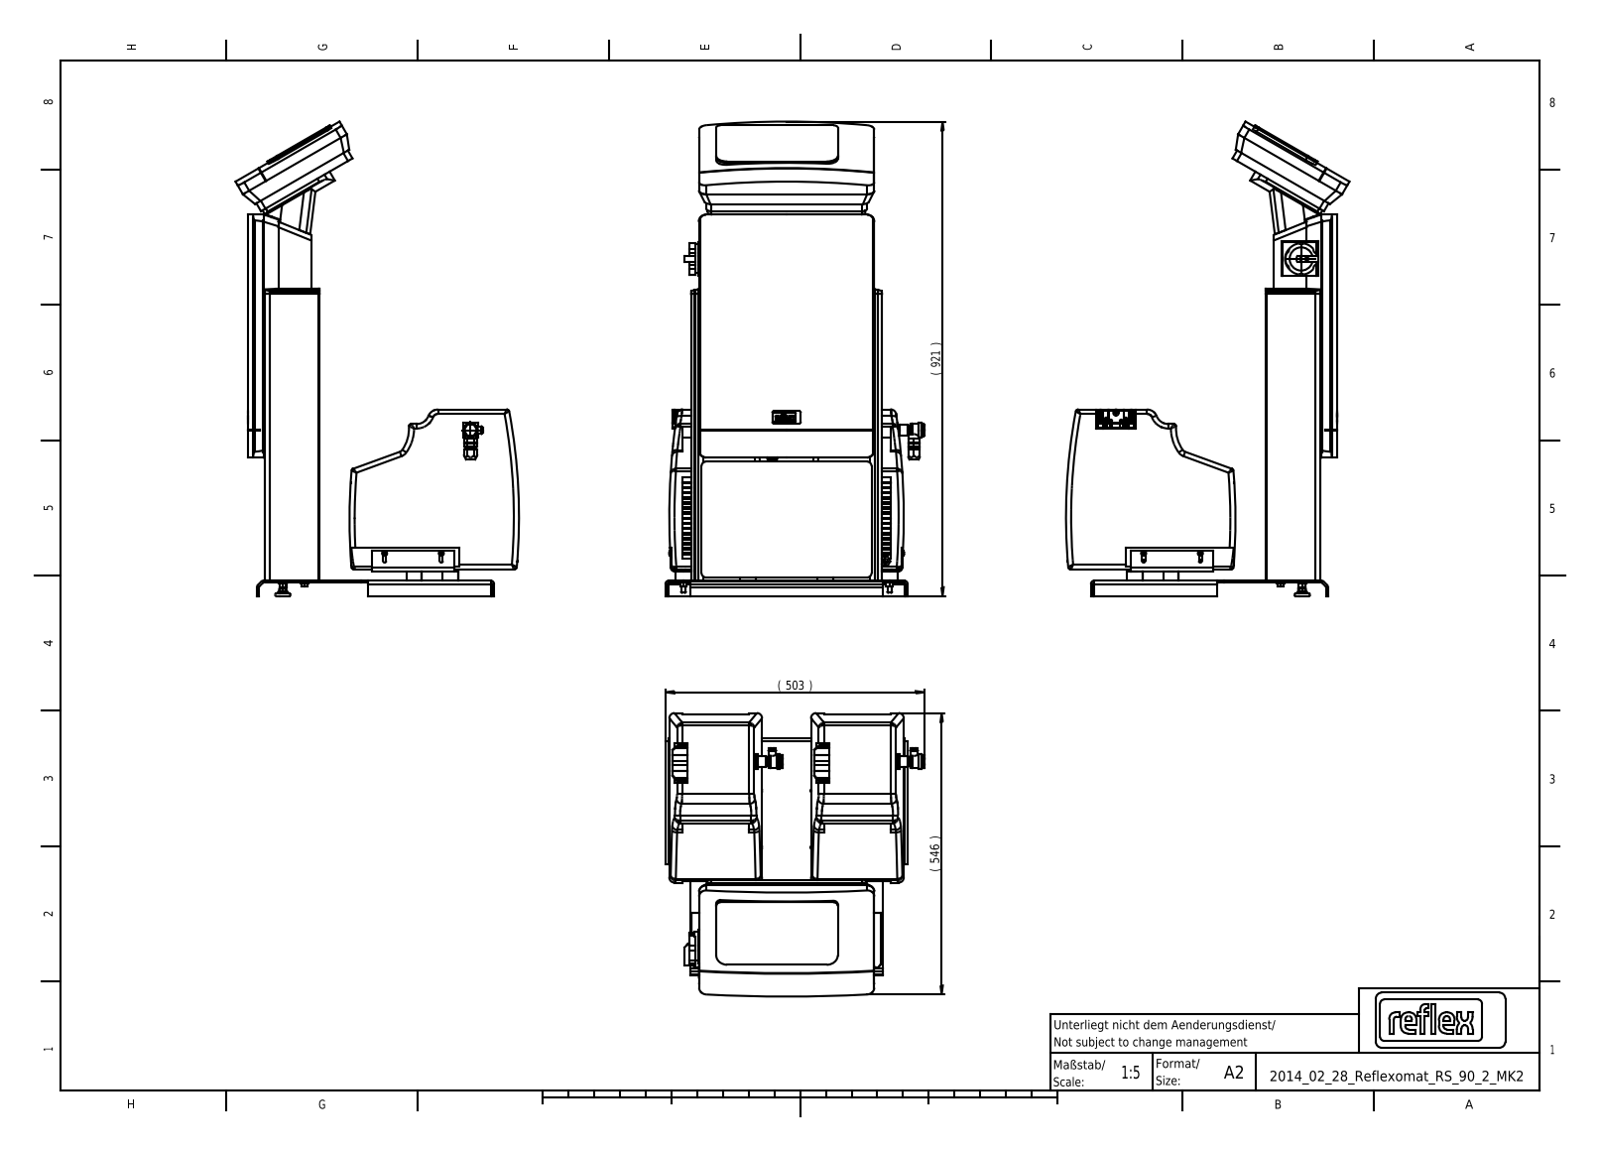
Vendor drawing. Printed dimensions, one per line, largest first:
921 ( )
546 ( )
503 ( )
